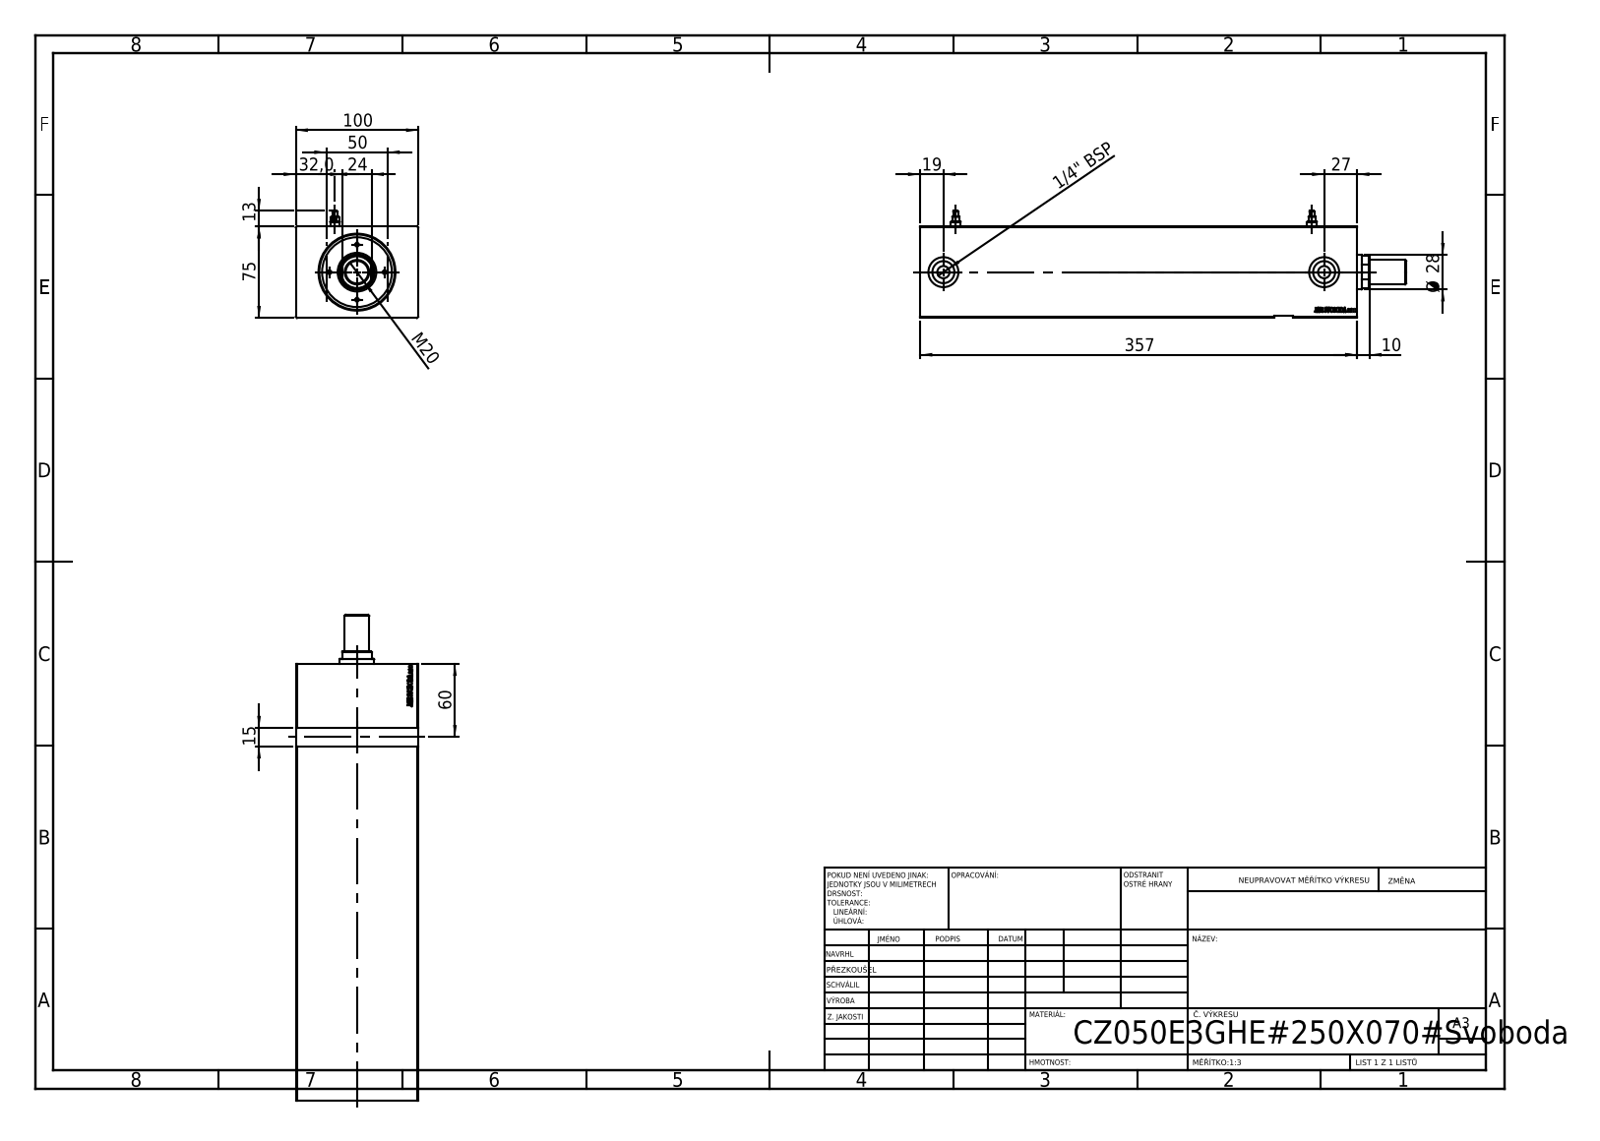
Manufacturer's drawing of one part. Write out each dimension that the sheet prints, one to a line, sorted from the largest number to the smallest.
357
100
75
60
50
32,0
Ø 28
27
24
M20
19
15
13
10
1/4" BSP
